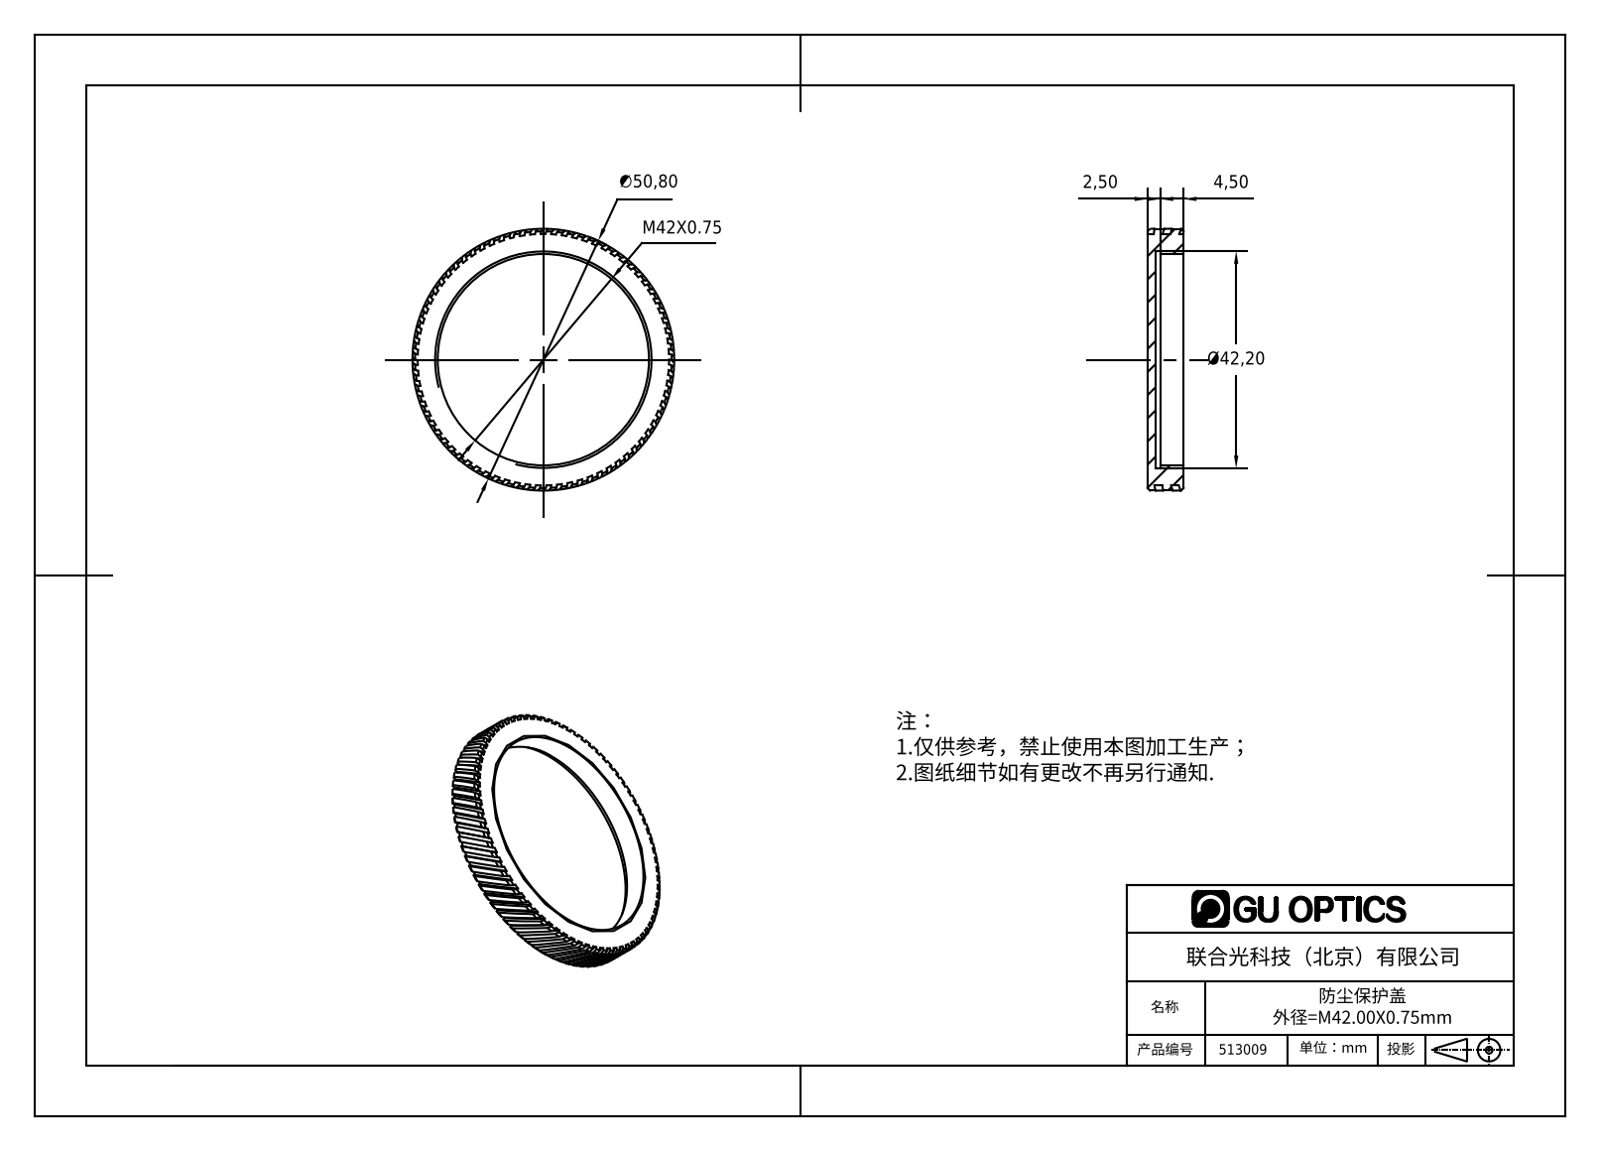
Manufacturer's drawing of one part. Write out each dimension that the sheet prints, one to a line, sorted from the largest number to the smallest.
∅50,80
Ø42,20
M42X0.75
4,50
2,50
